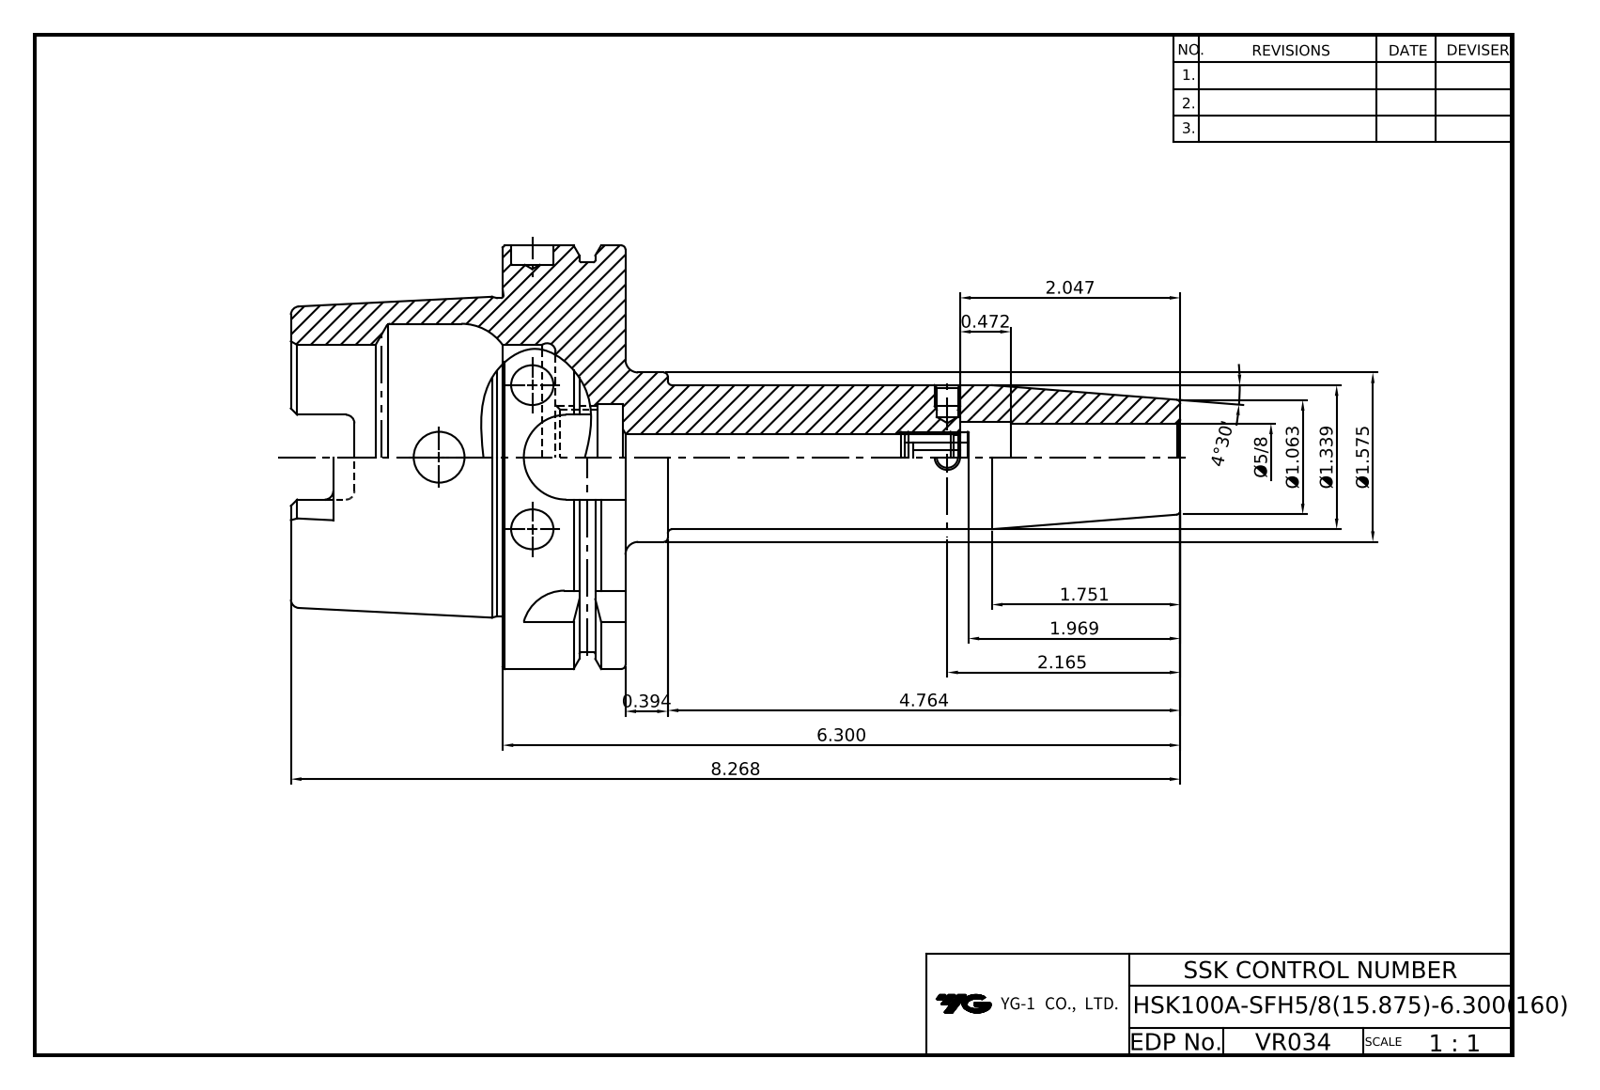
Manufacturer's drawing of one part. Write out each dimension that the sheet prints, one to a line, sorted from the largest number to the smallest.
8.268
6.300
4.764
4°30'
2.165
2.047
1.969
1.751
Ø1.575
Ø1.339
Ø1.063
0.472
0.394
